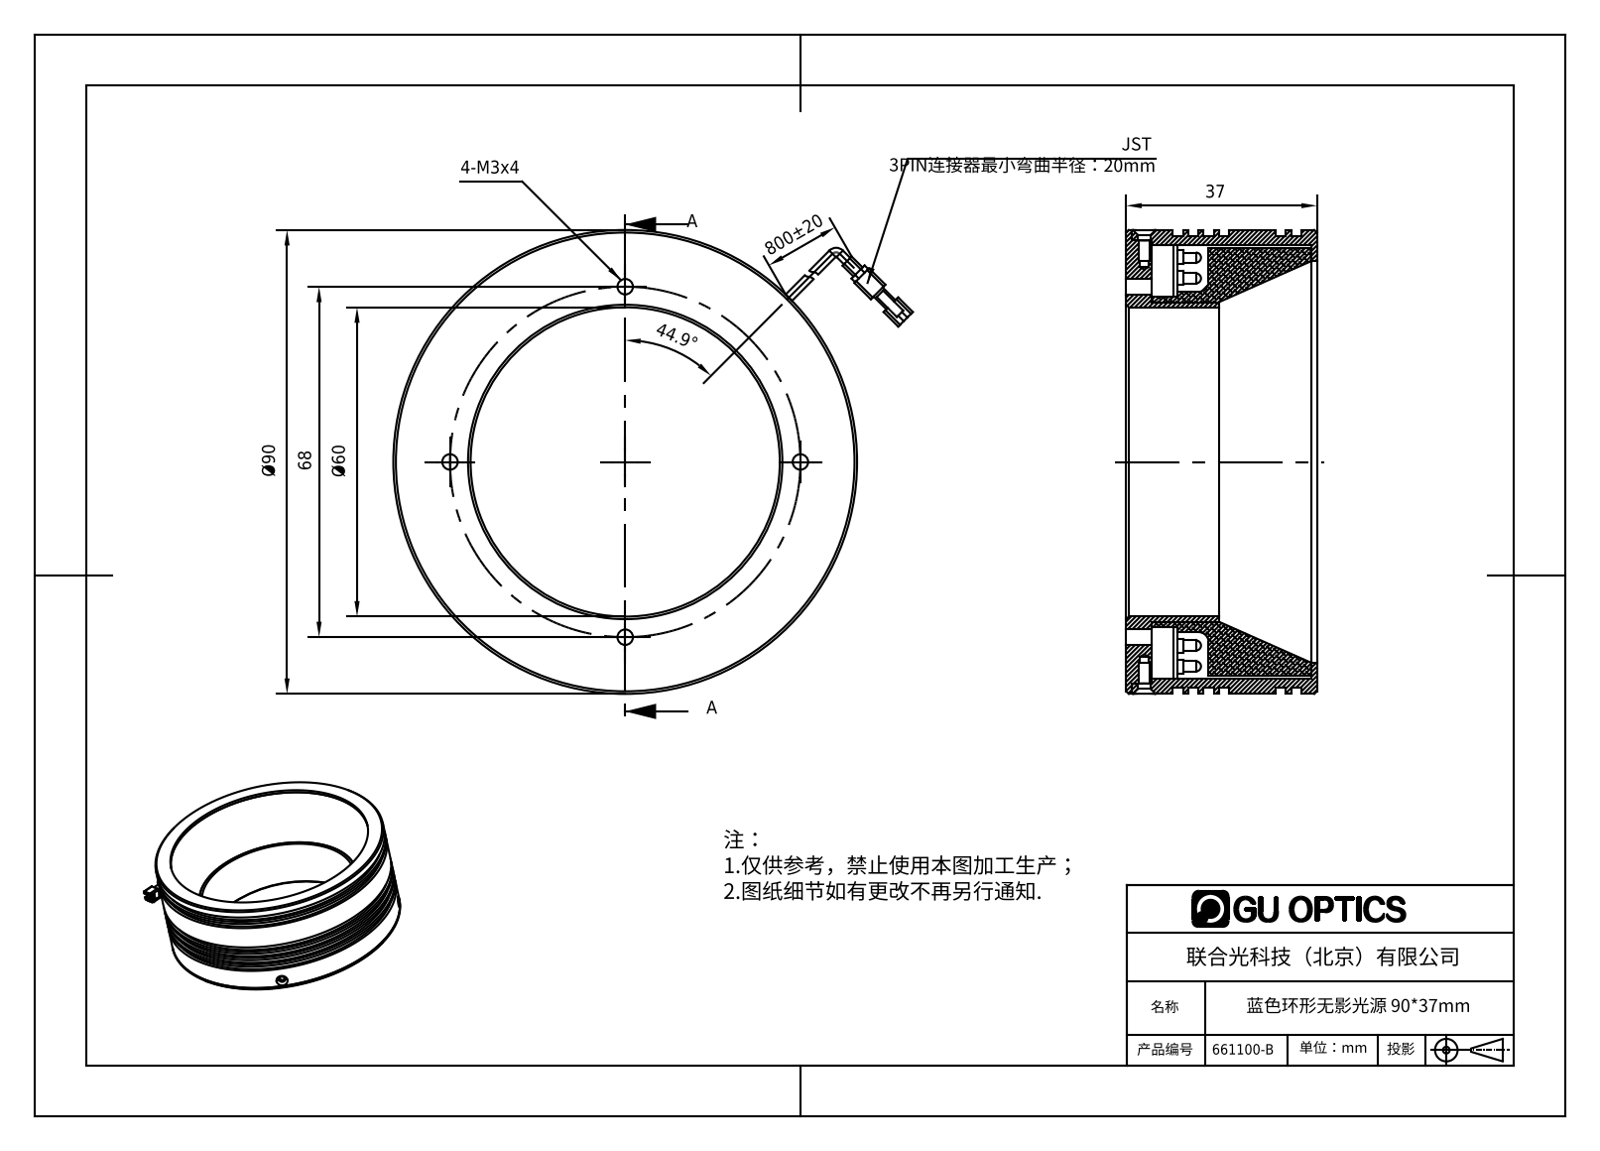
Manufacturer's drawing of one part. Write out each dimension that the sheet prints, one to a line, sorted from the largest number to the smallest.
800±20
Ø90
68
Ø60
44.9°
37
